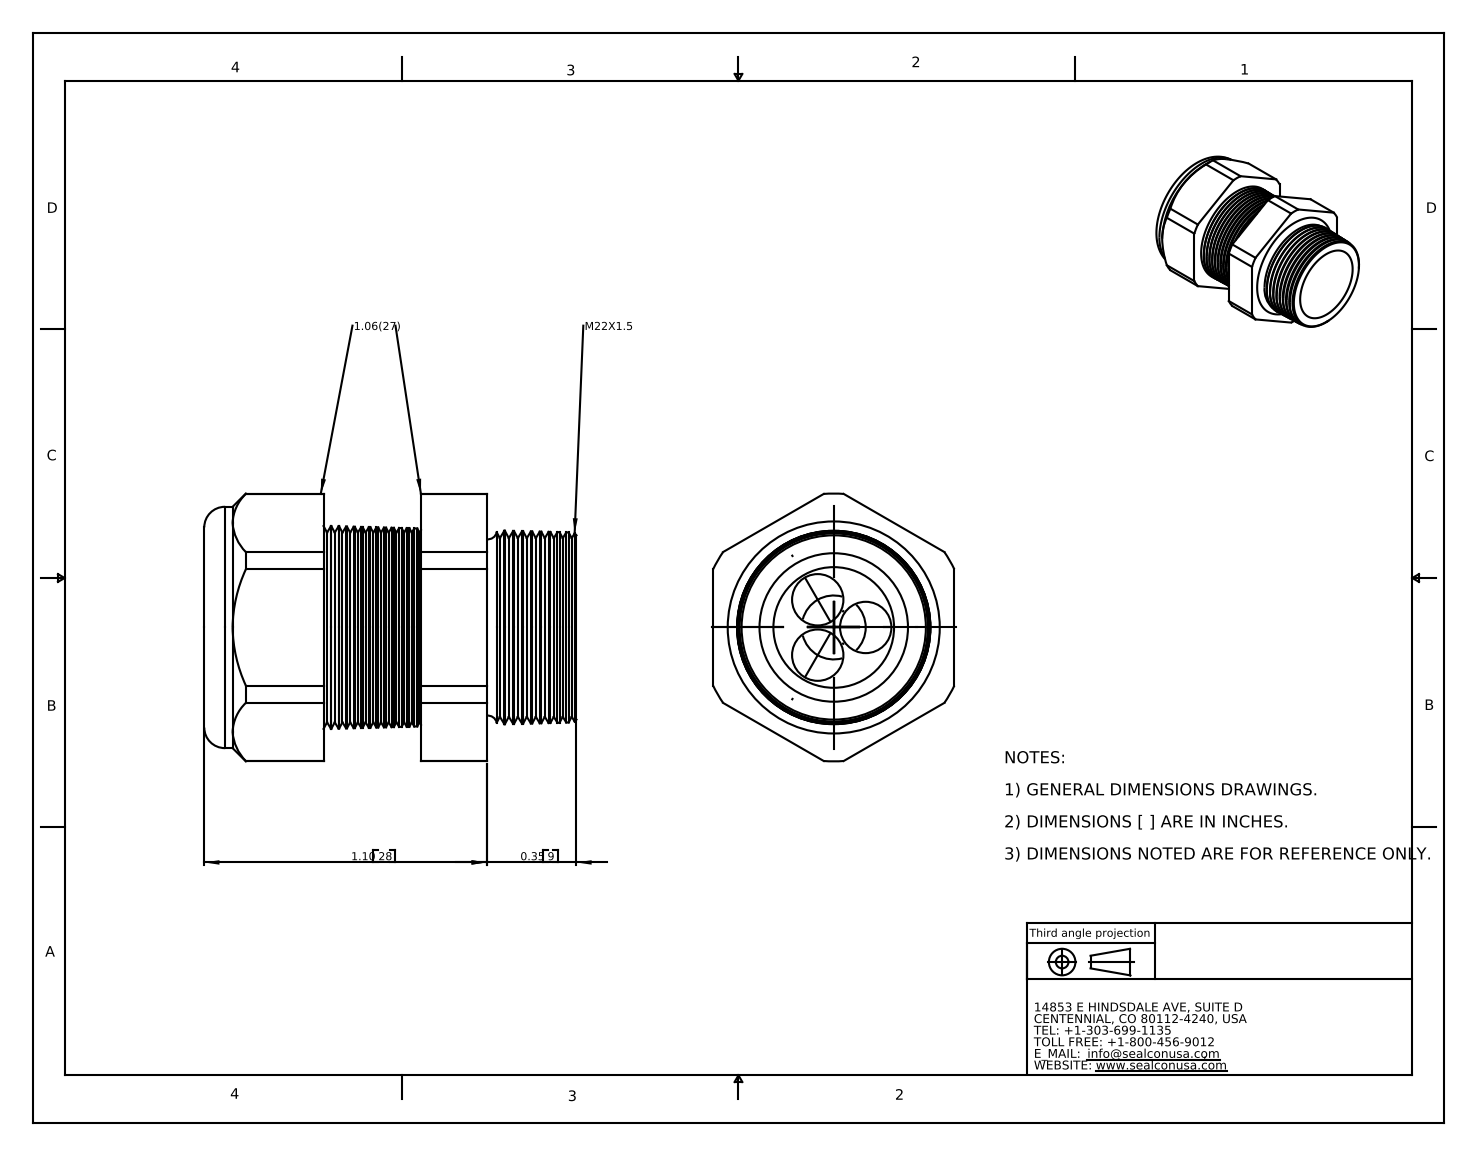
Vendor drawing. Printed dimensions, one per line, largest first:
1.10 28
0.35 9
